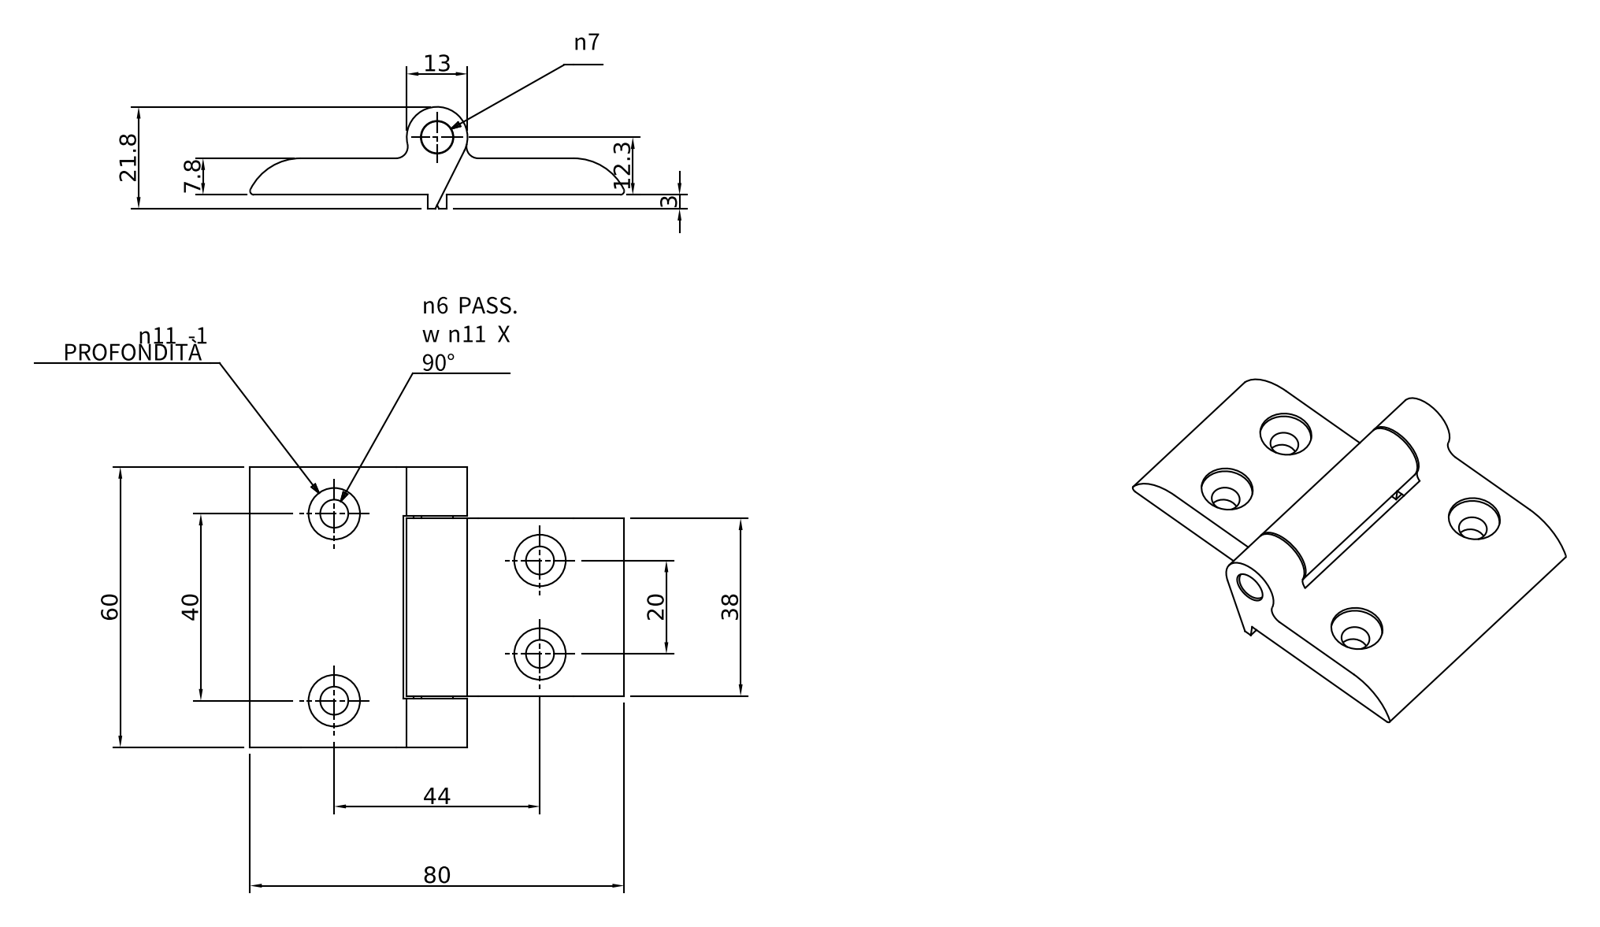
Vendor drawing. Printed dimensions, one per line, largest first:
80
60
44
40
38
21.8
20
13
12.3
7.8
3
